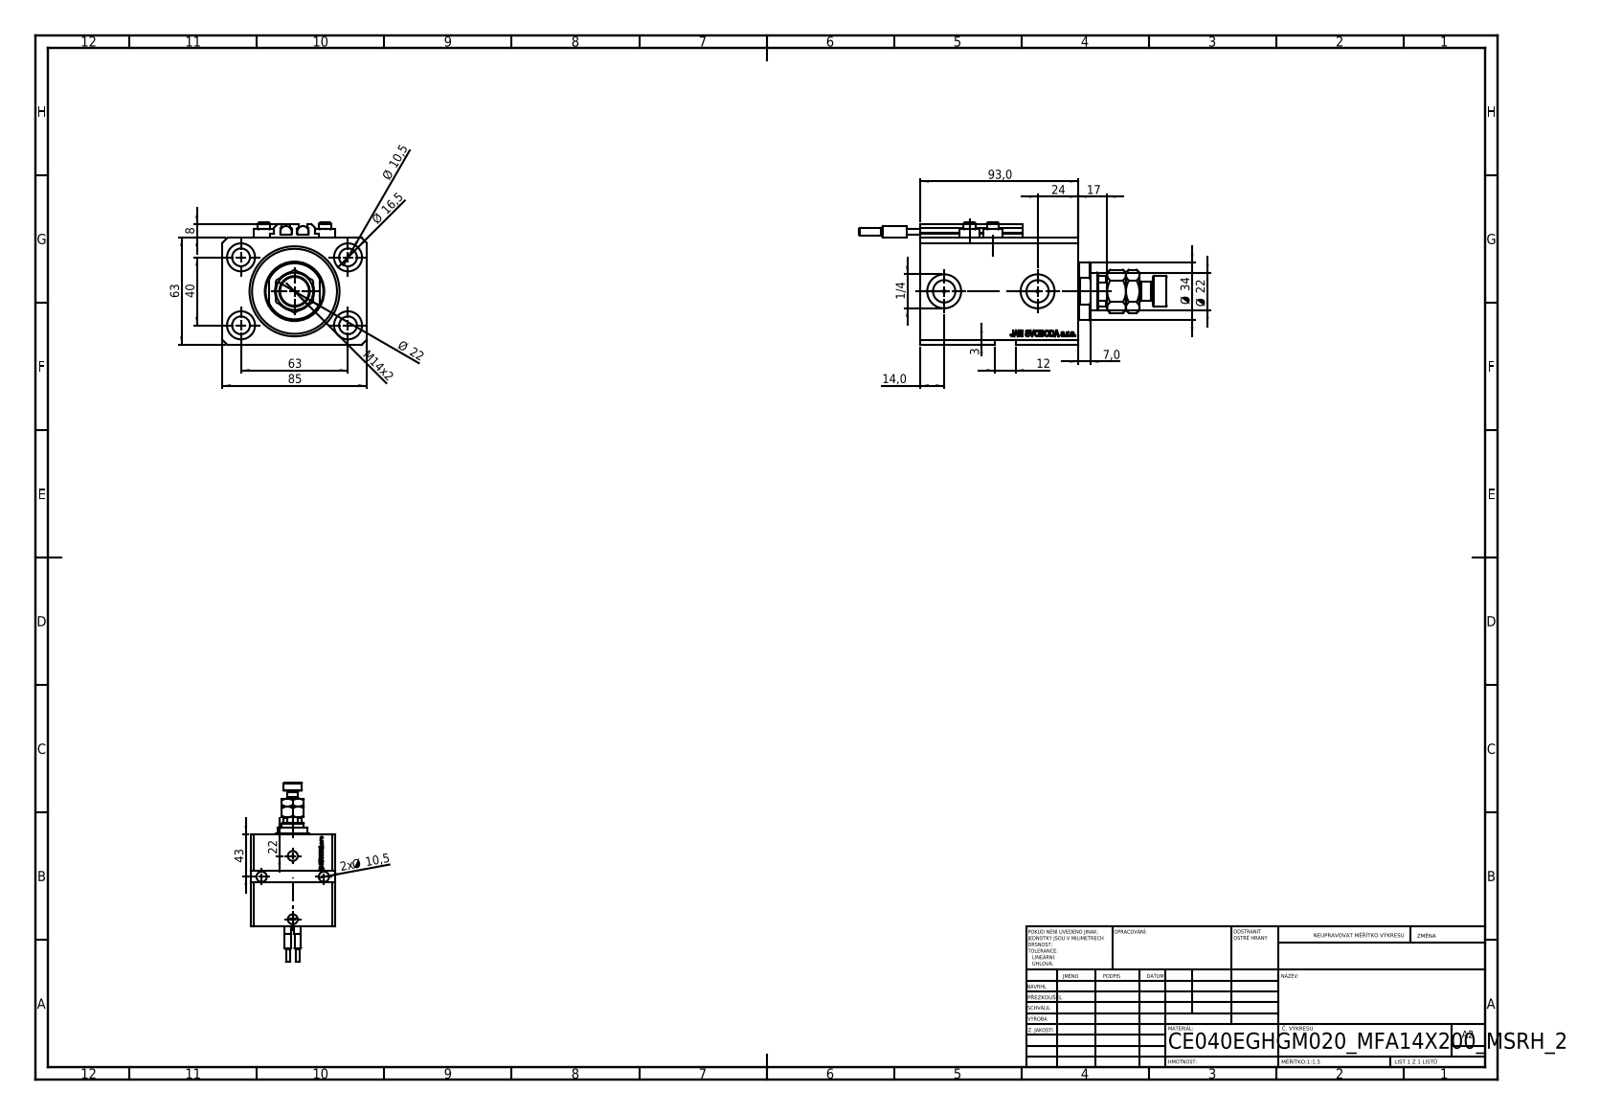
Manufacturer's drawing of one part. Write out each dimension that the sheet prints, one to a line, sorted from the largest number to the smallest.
93,0
85
63
63
43
40
Ø 34
24
Ø 22
Ø 22
22
17
Ø 16,5
M14x2
14,0
12
Ø 10,5
2x Ø 10,5
8
7,0
3
1/4
